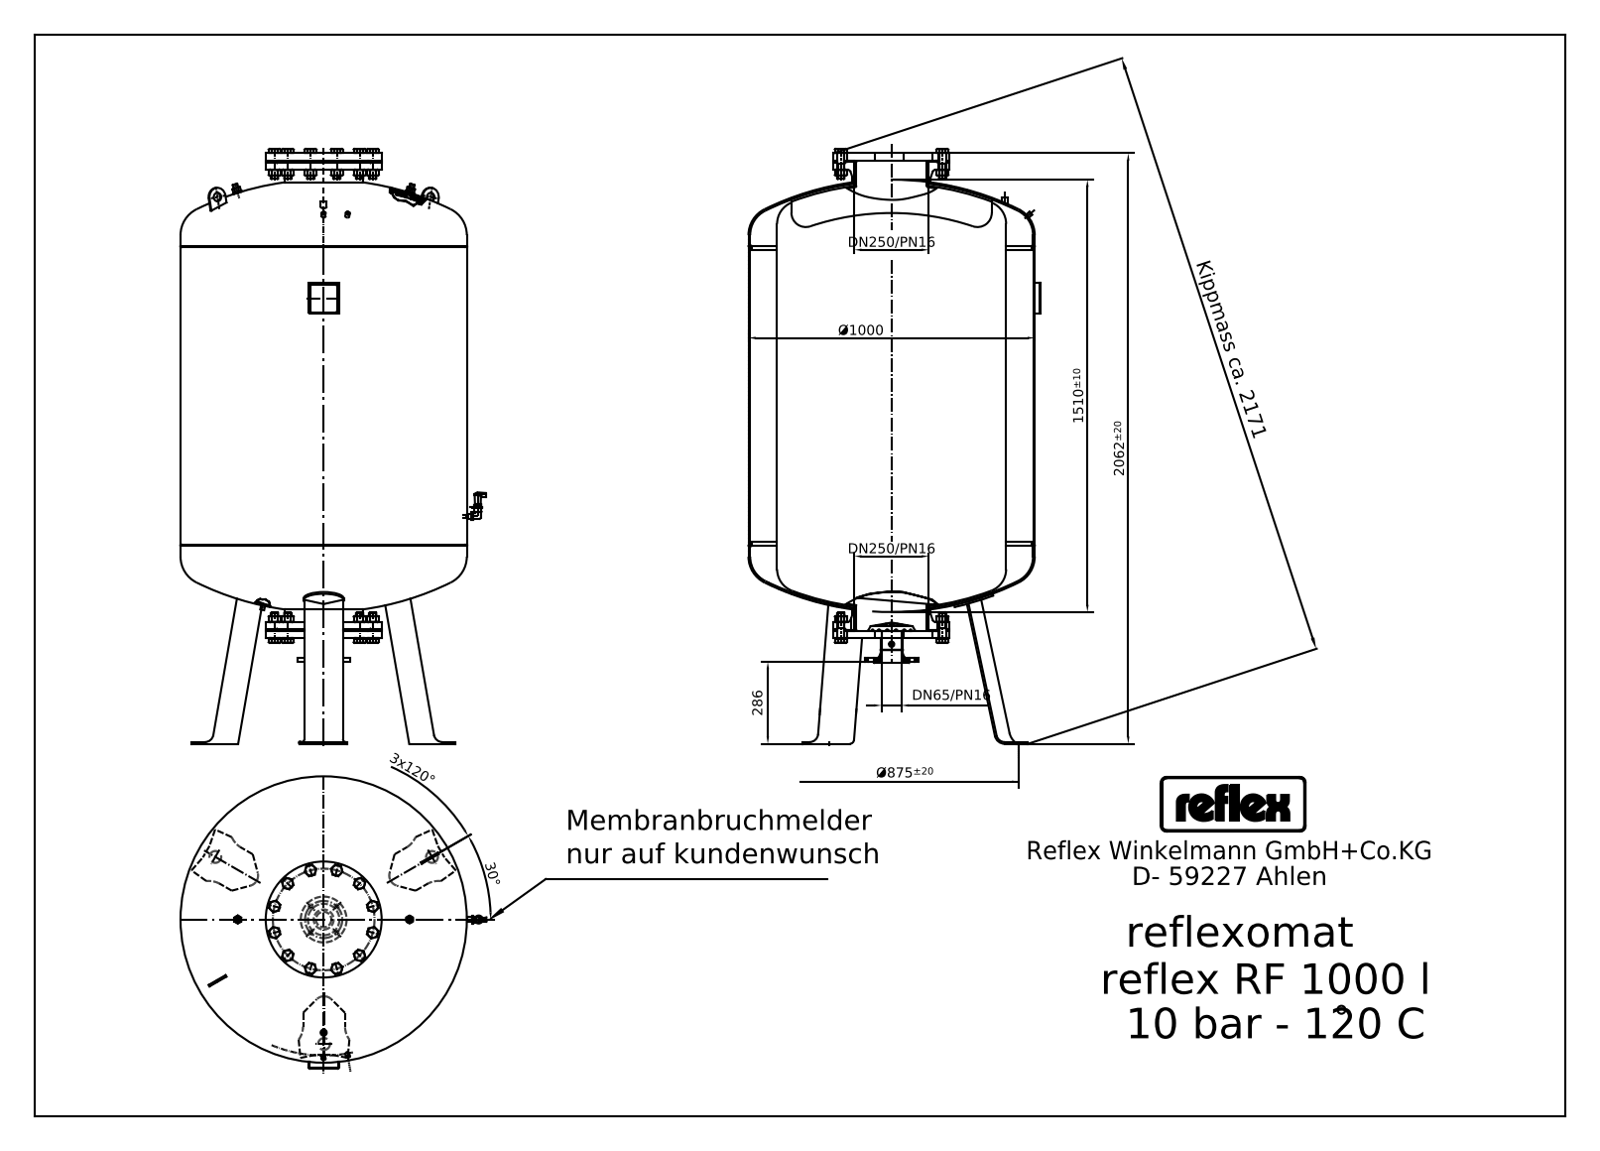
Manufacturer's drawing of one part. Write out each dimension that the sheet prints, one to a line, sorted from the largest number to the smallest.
Kippmass ca. 2171
2062±20
1510±10
Ø1000
286
DN250/PN16
DN250/PN16
3x120°
DN65/PN16
30°
